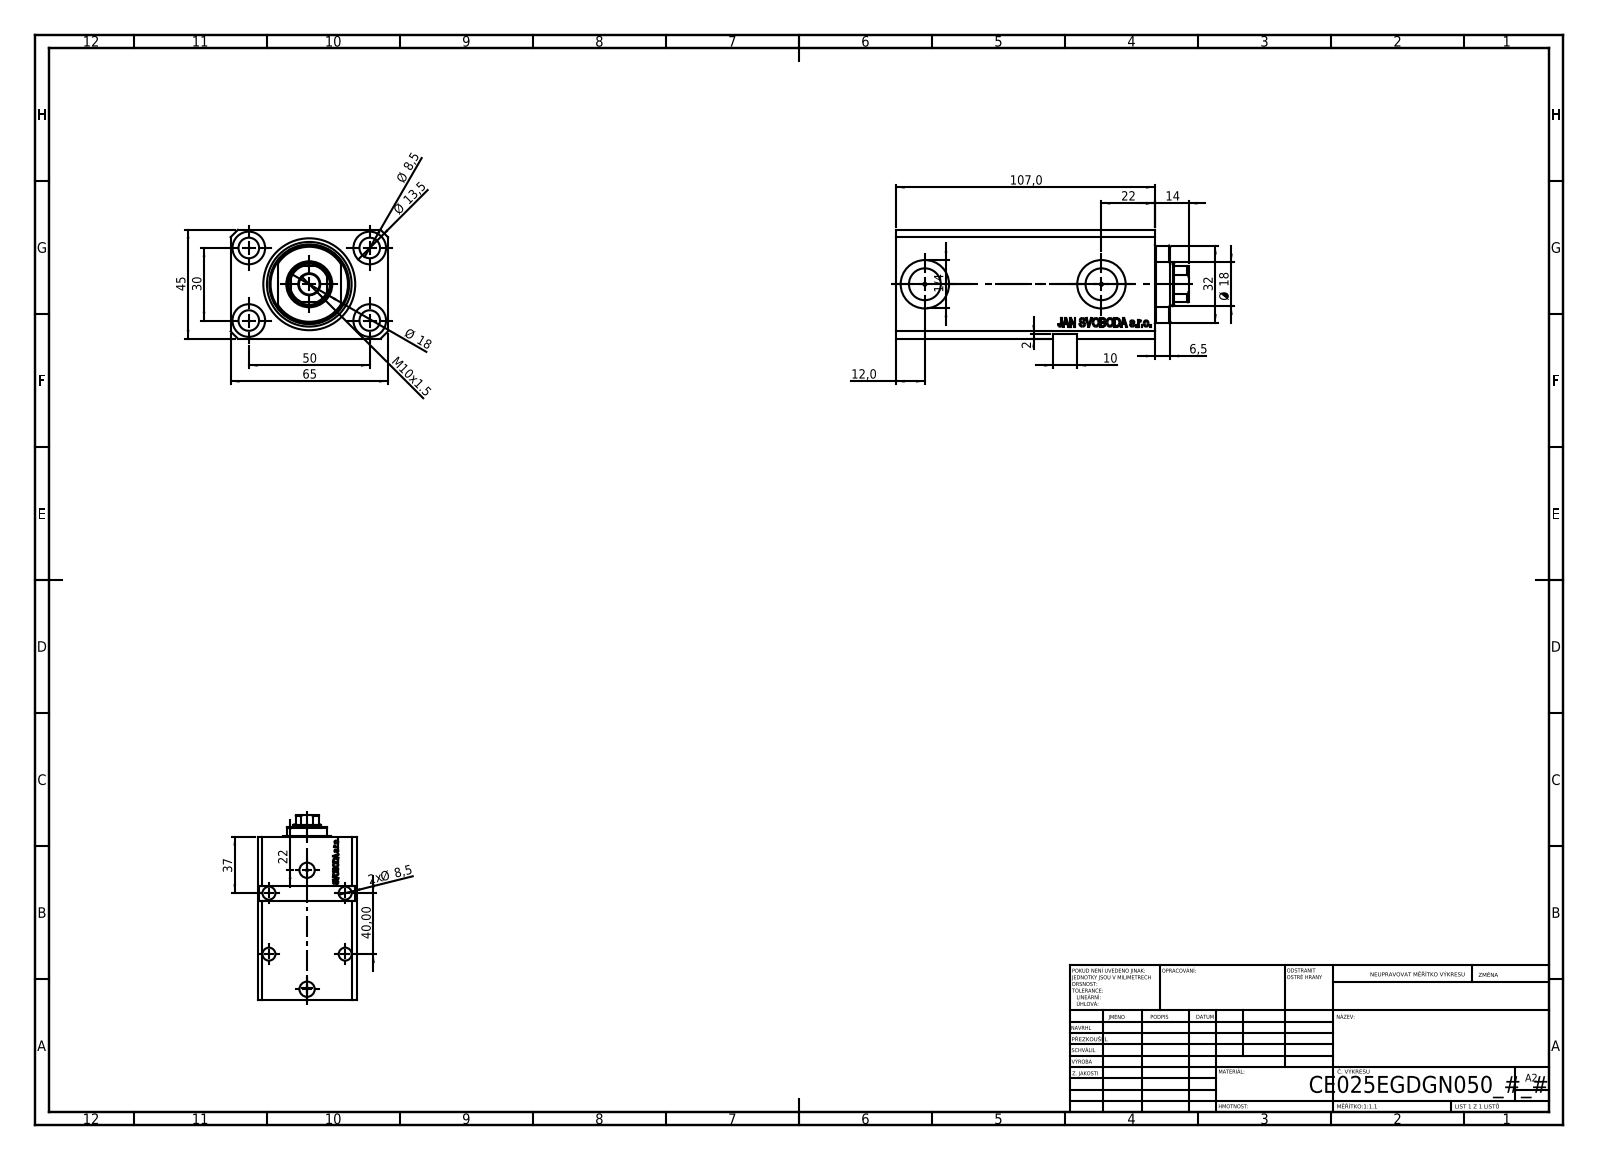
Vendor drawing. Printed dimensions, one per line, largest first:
107,0
65
50
45
40,00
37
32
30
22
22
Ø 18
Ø 18
14
Ø 13,5
12,0
M10x1.5
10
Ø 8,5
2x Ø 8,5
6,5
2
1/4
